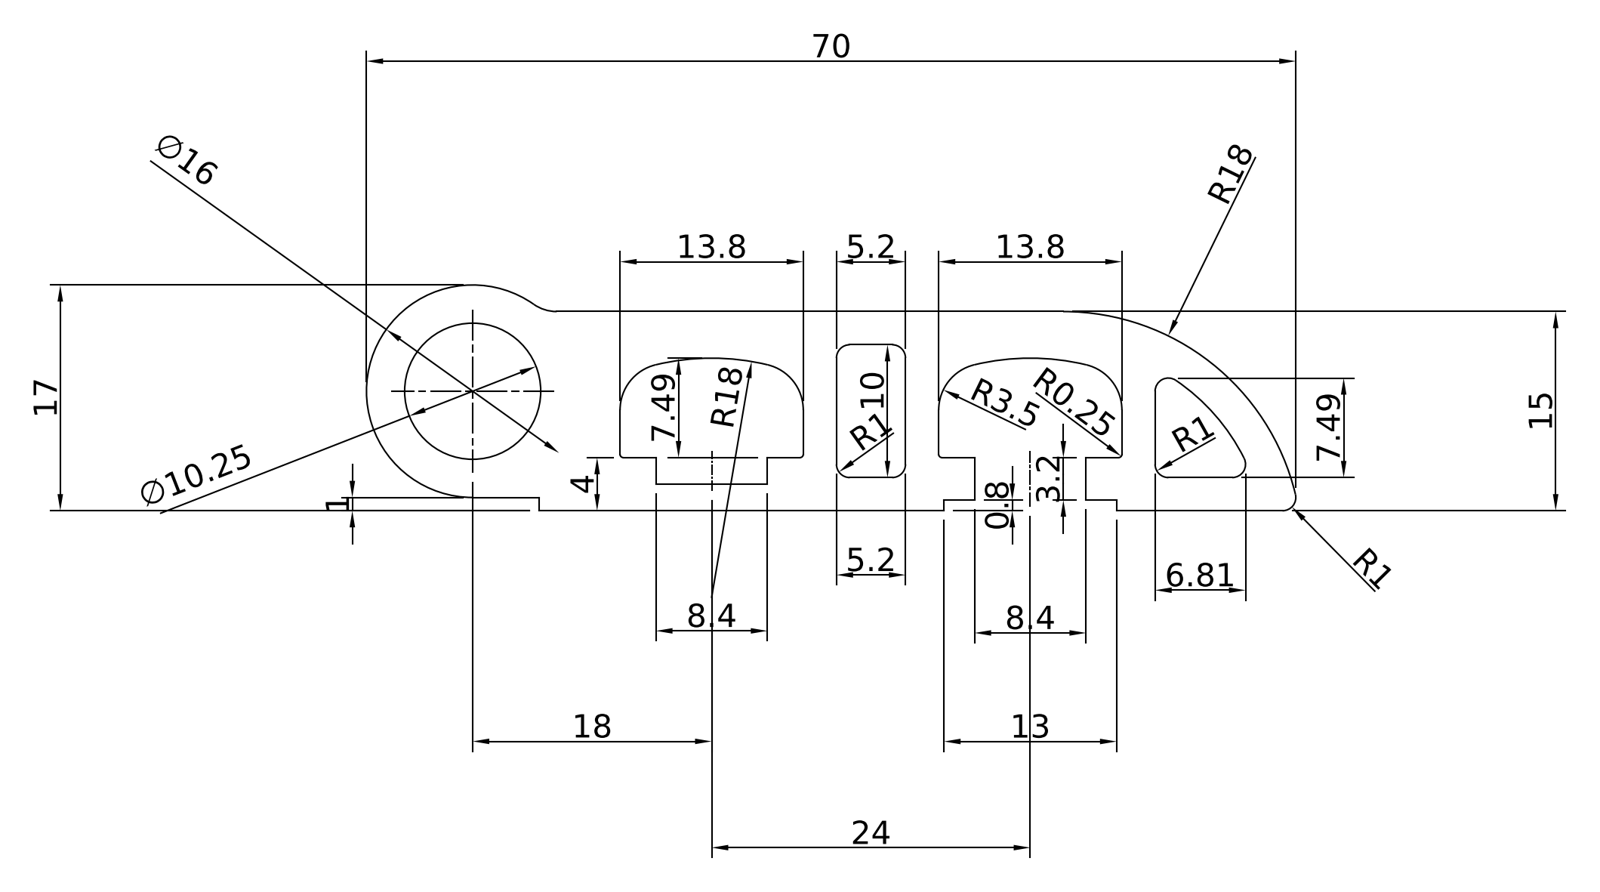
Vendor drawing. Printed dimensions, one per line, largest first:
70
24
18
R18
R18
17
∅16
15
13.8
13.8
13
∅10.25
10
8.4
8.4
7.49
7.49
6.81
5.2
5.2
4
R3.5
3.2
1
R1
R1
R1
0.8
R0.25
